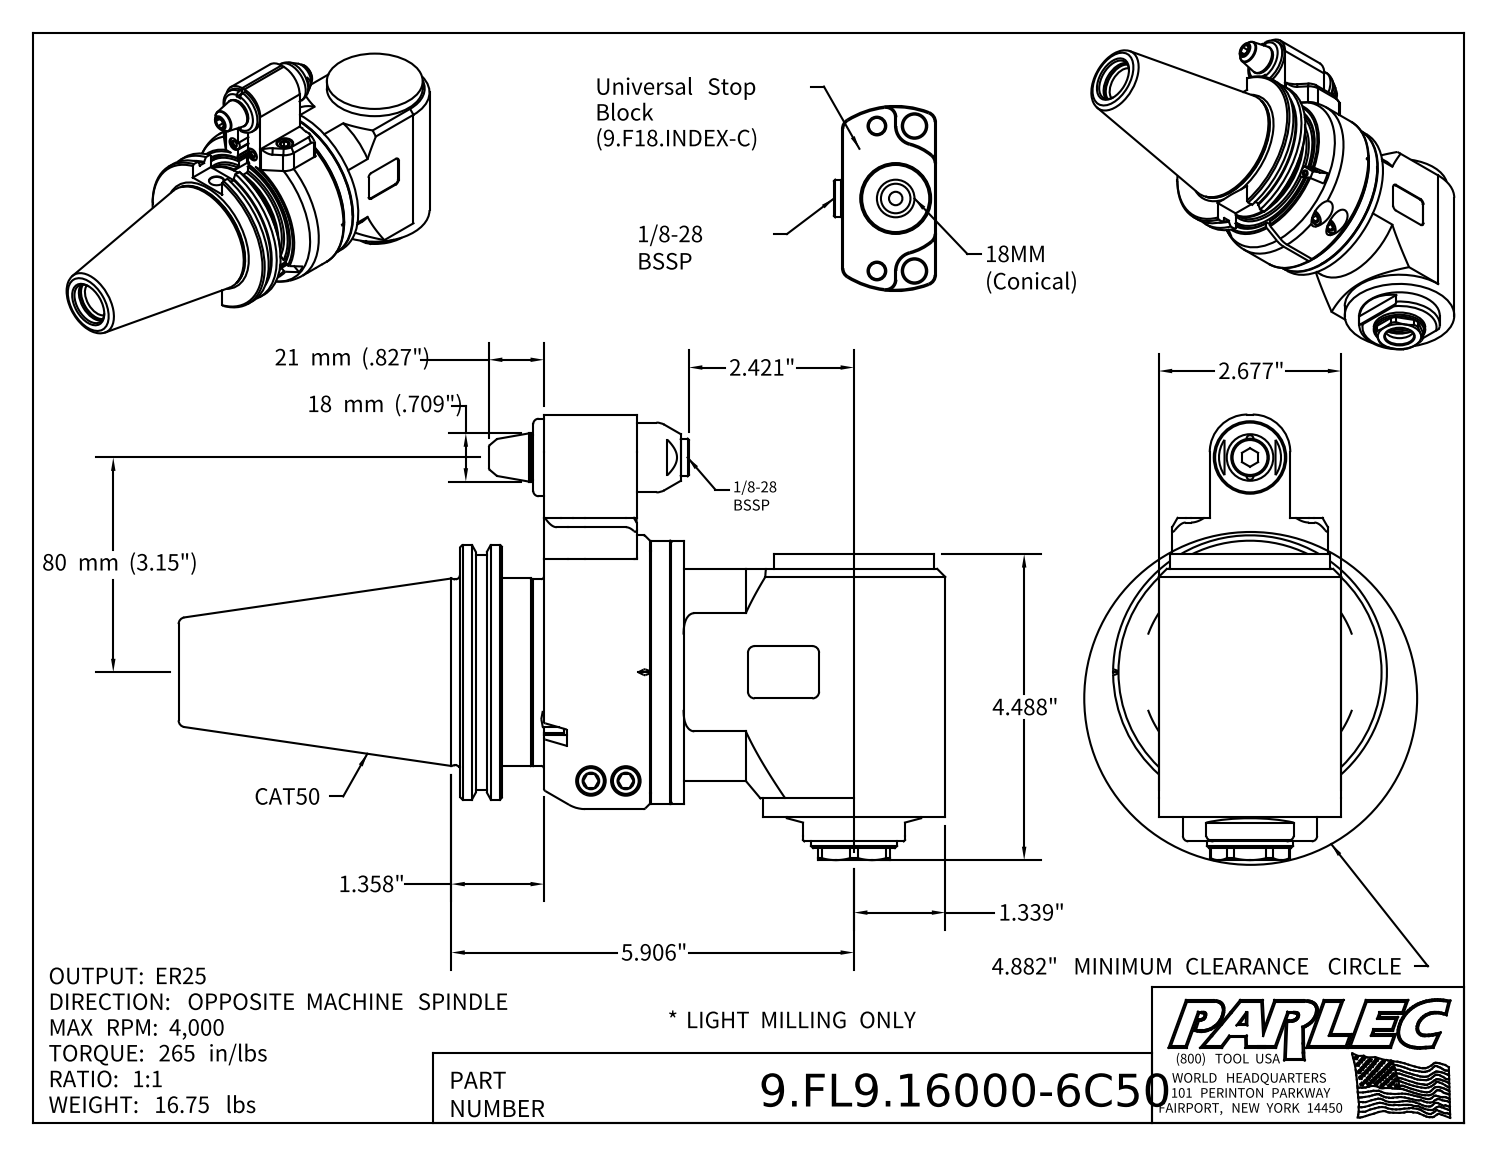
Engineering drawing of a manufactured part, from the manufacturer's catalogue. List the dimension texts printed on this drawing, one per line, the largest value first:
80 mm (3.15")
21 mm (.827")
18 mm (.709")
5.906"
4.488"
2.677"
2.421"
1.358"
1.339"
